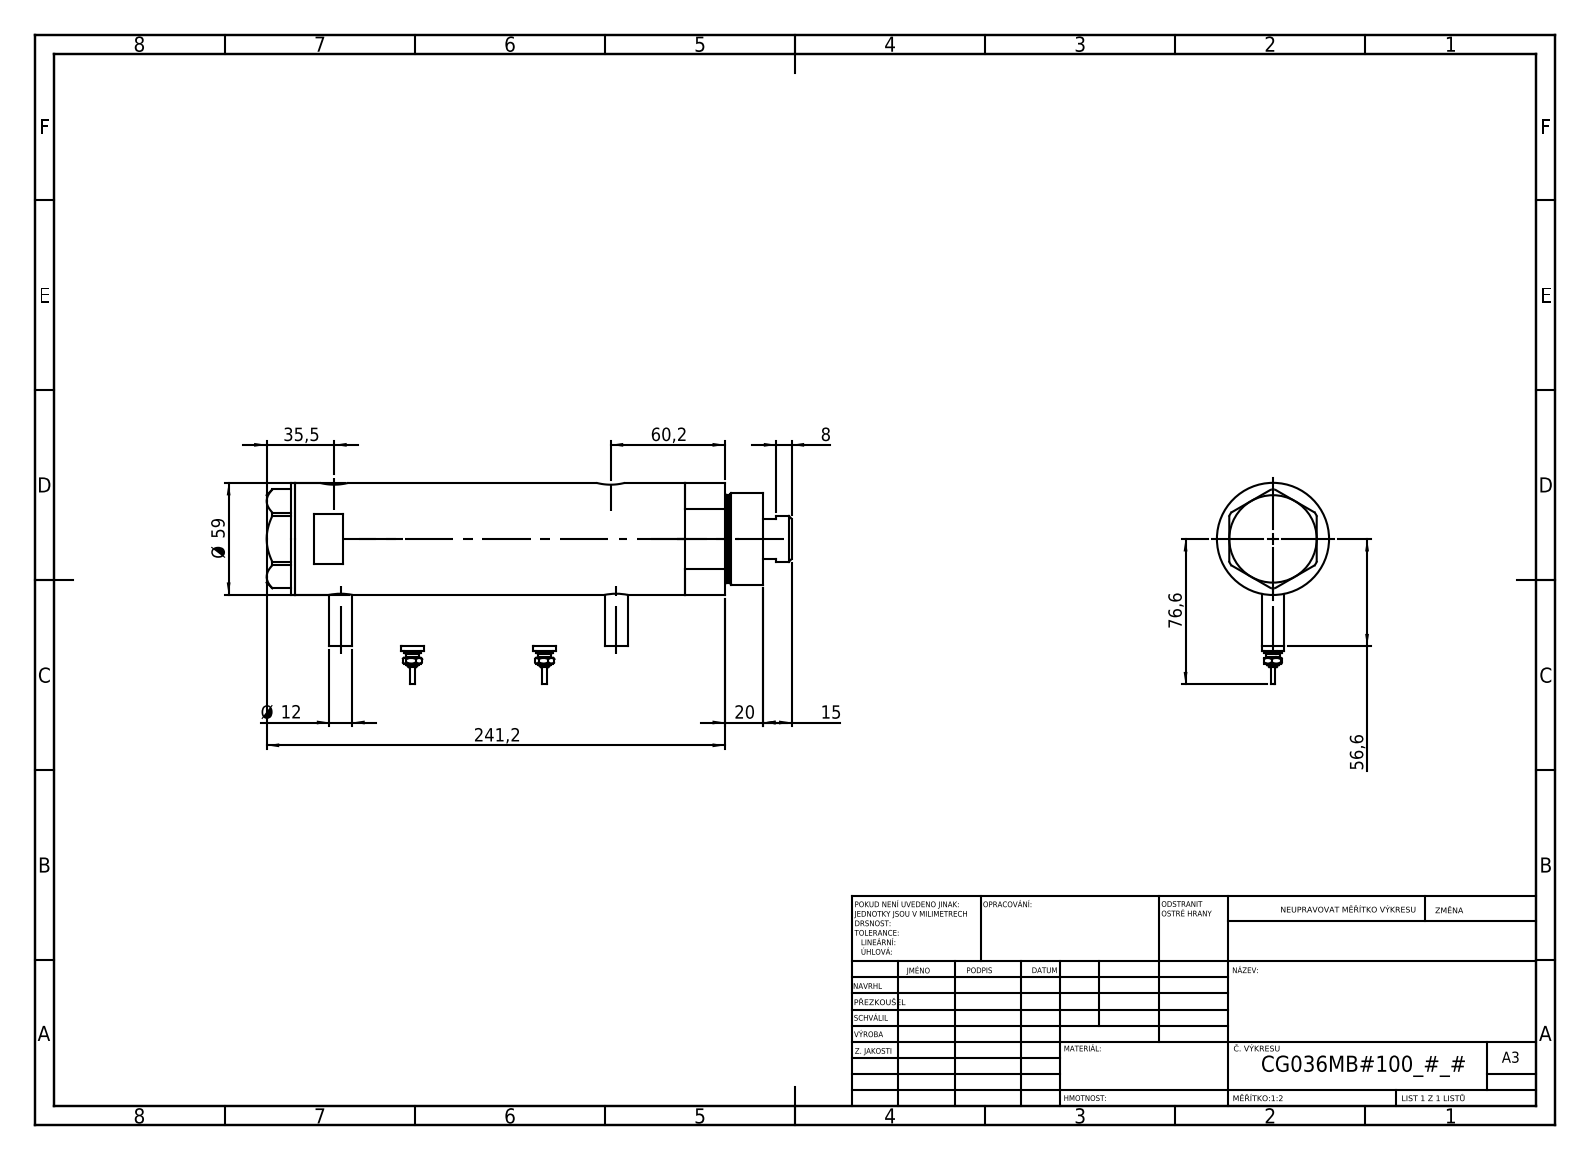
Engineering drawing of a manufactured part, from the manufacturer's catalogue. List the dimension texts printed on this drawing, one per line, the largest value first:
241,2
76,6
60,2
Ø 59
56,6
35,5
20
15
Ø 12
8
